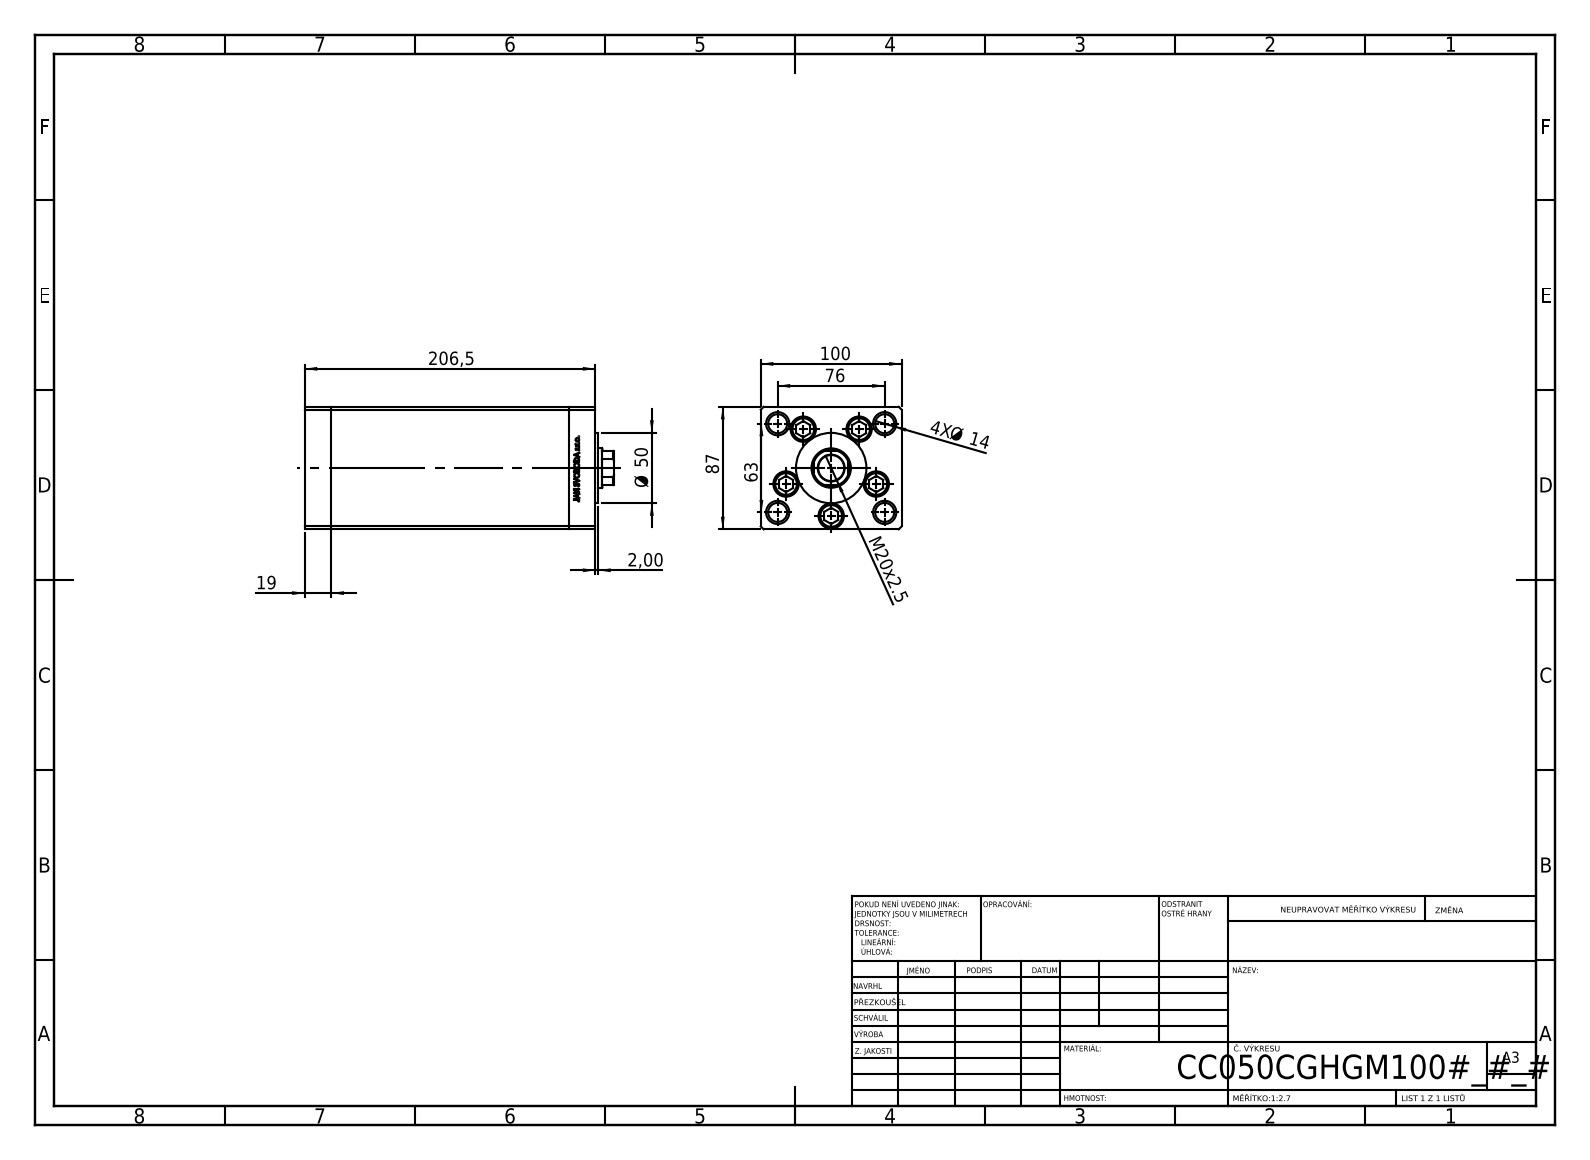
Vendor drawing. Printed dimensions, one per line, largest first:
206,5
100
87
76
63
Ø 50
M20x2.5
19
4X Ø 14
2,00
